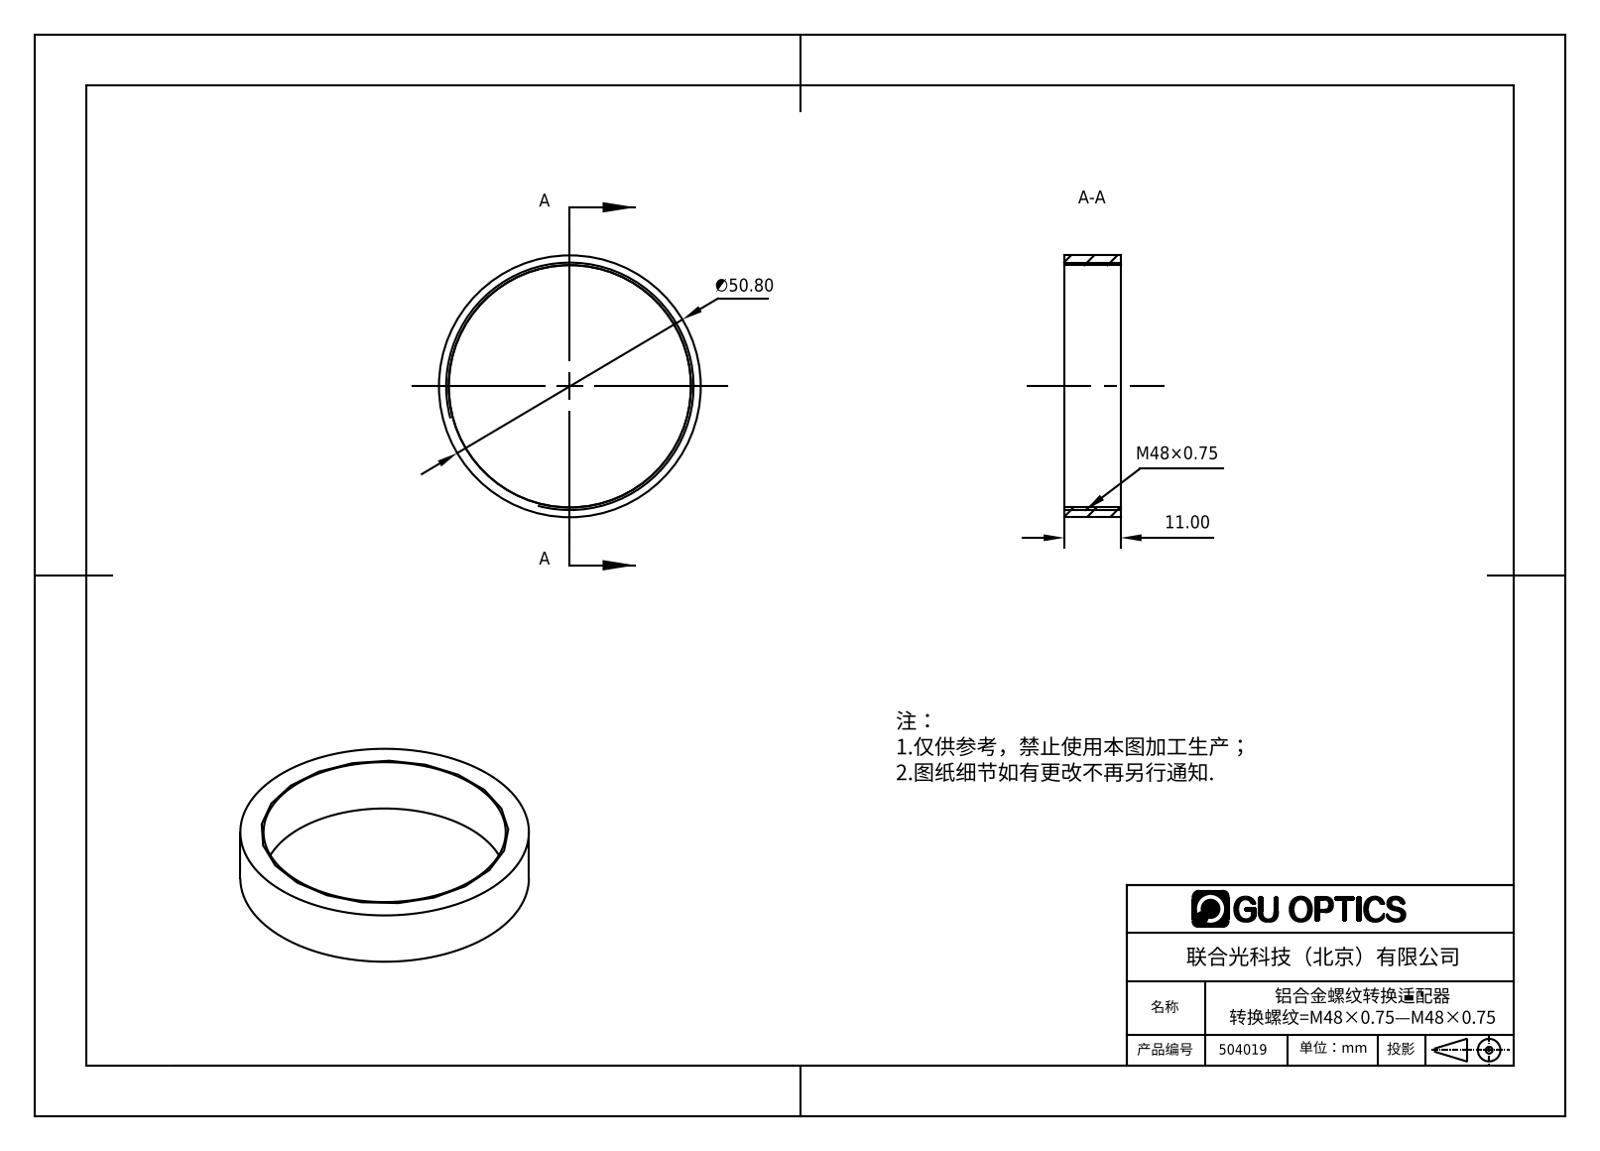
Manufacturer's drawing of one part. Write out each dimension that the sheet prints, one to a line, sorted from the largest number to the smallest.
∅50.80
11.00
